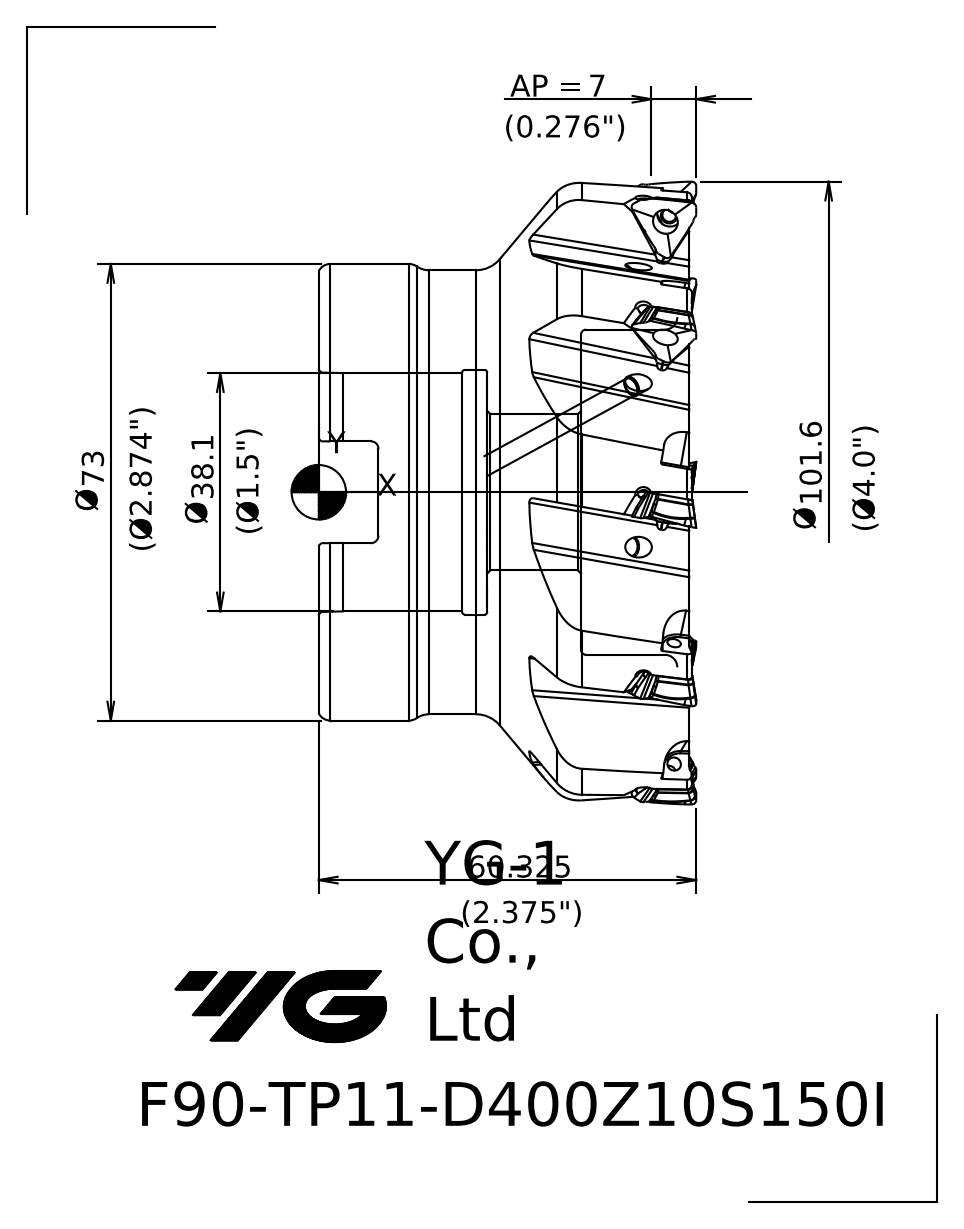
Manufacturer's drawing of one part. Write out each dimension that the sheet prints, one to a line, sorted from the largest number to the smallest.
101.6 Ø
73 Ø
60.325
38.1 Ø
AP = 7
